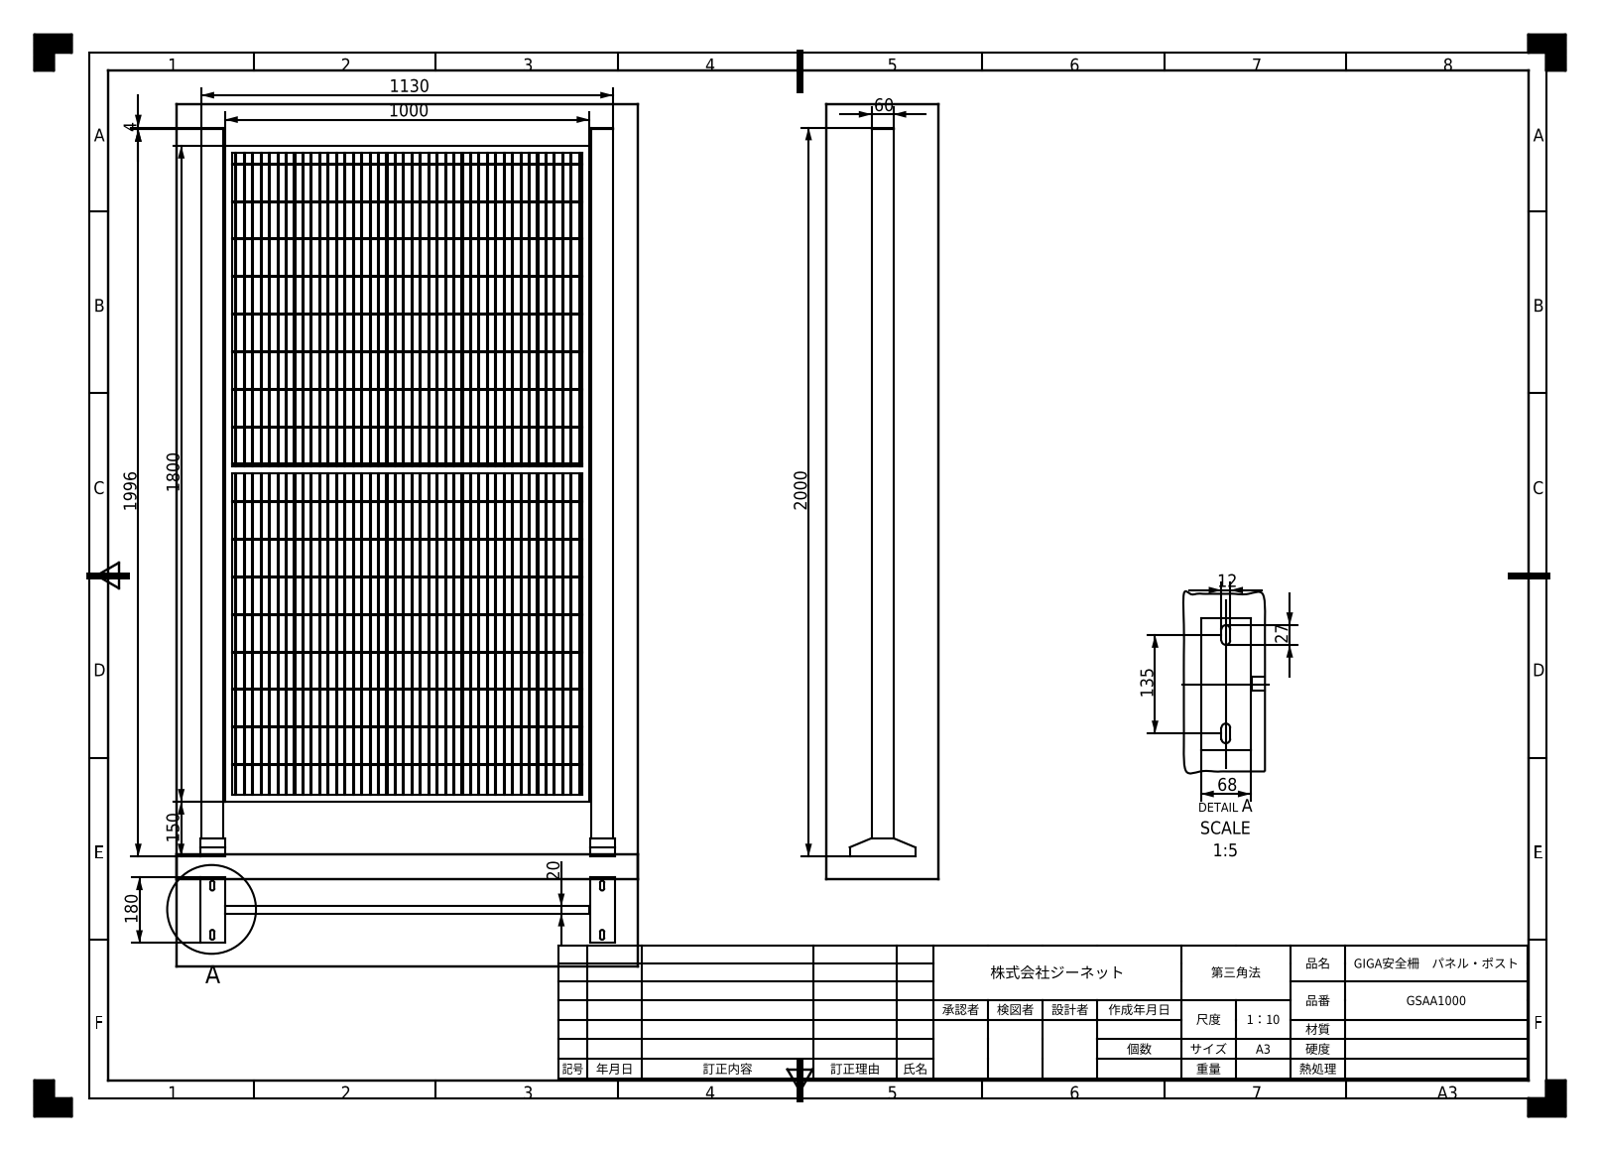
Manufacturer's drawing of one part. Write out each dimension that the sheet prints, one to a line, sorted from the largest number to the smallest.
2000
1996
1800
1130
1000
180
150
135
68
60
27
20
12
4
